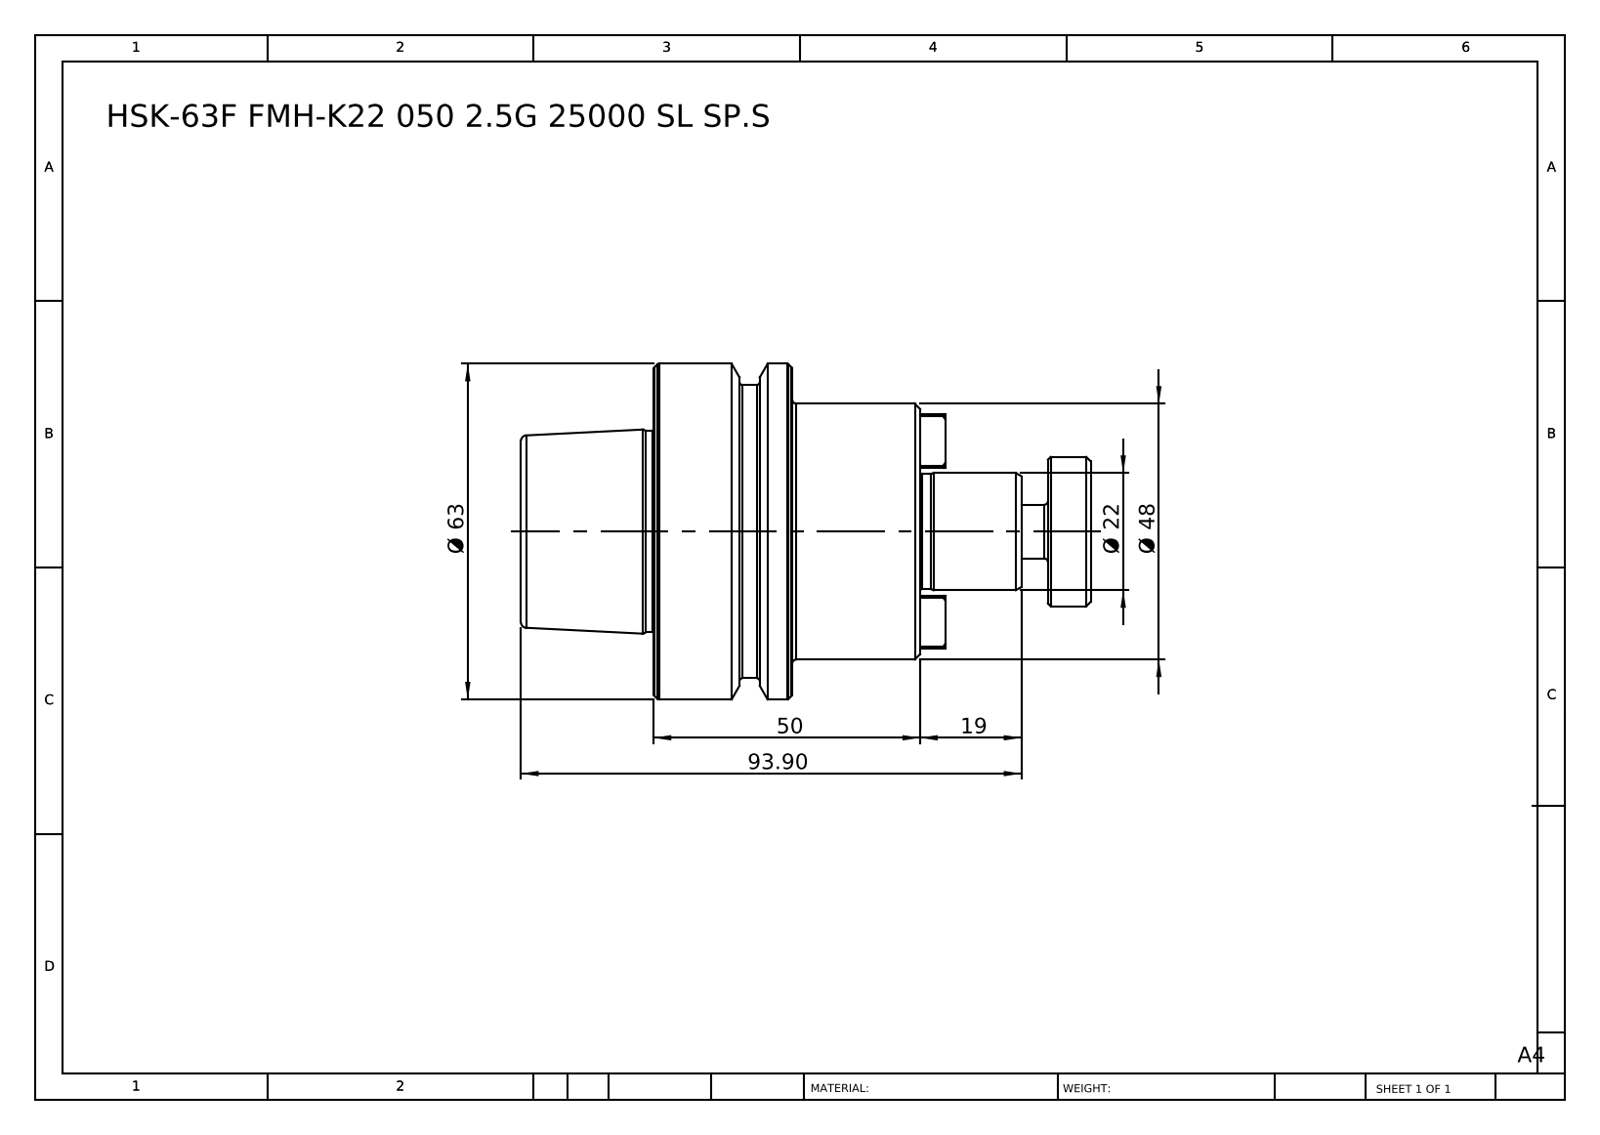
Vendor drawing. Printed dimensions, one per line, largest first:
93.90
Ø 63
50
Ø 48
Ø 22
19
